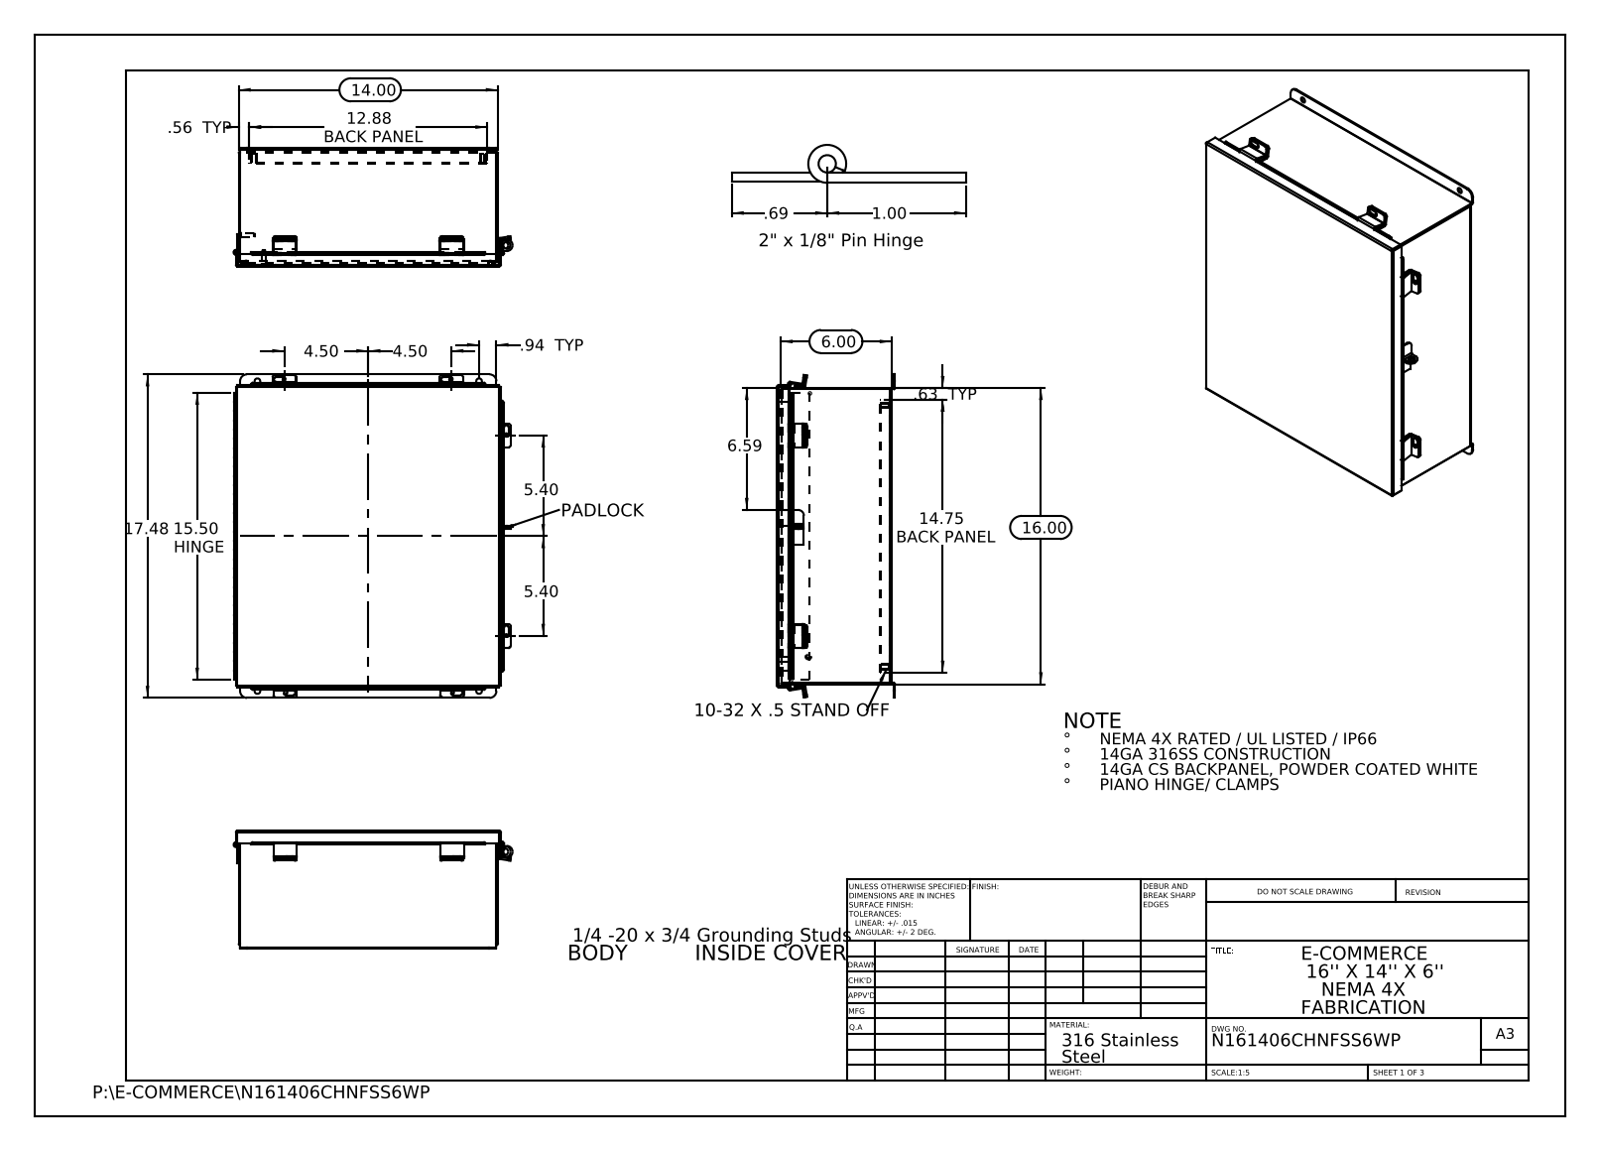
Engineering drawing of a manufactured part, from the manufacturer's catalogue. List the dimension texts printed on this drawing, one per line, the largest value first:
17.48
16.00
15.50 HINGE
14.75 BACK PANEL
14.00
12.88 BACK PANEL
6.59
6.00
5.40
5.40
4.50
4.50
1.00
.94 TYP
.69
.63 TYP
.56 TYP
